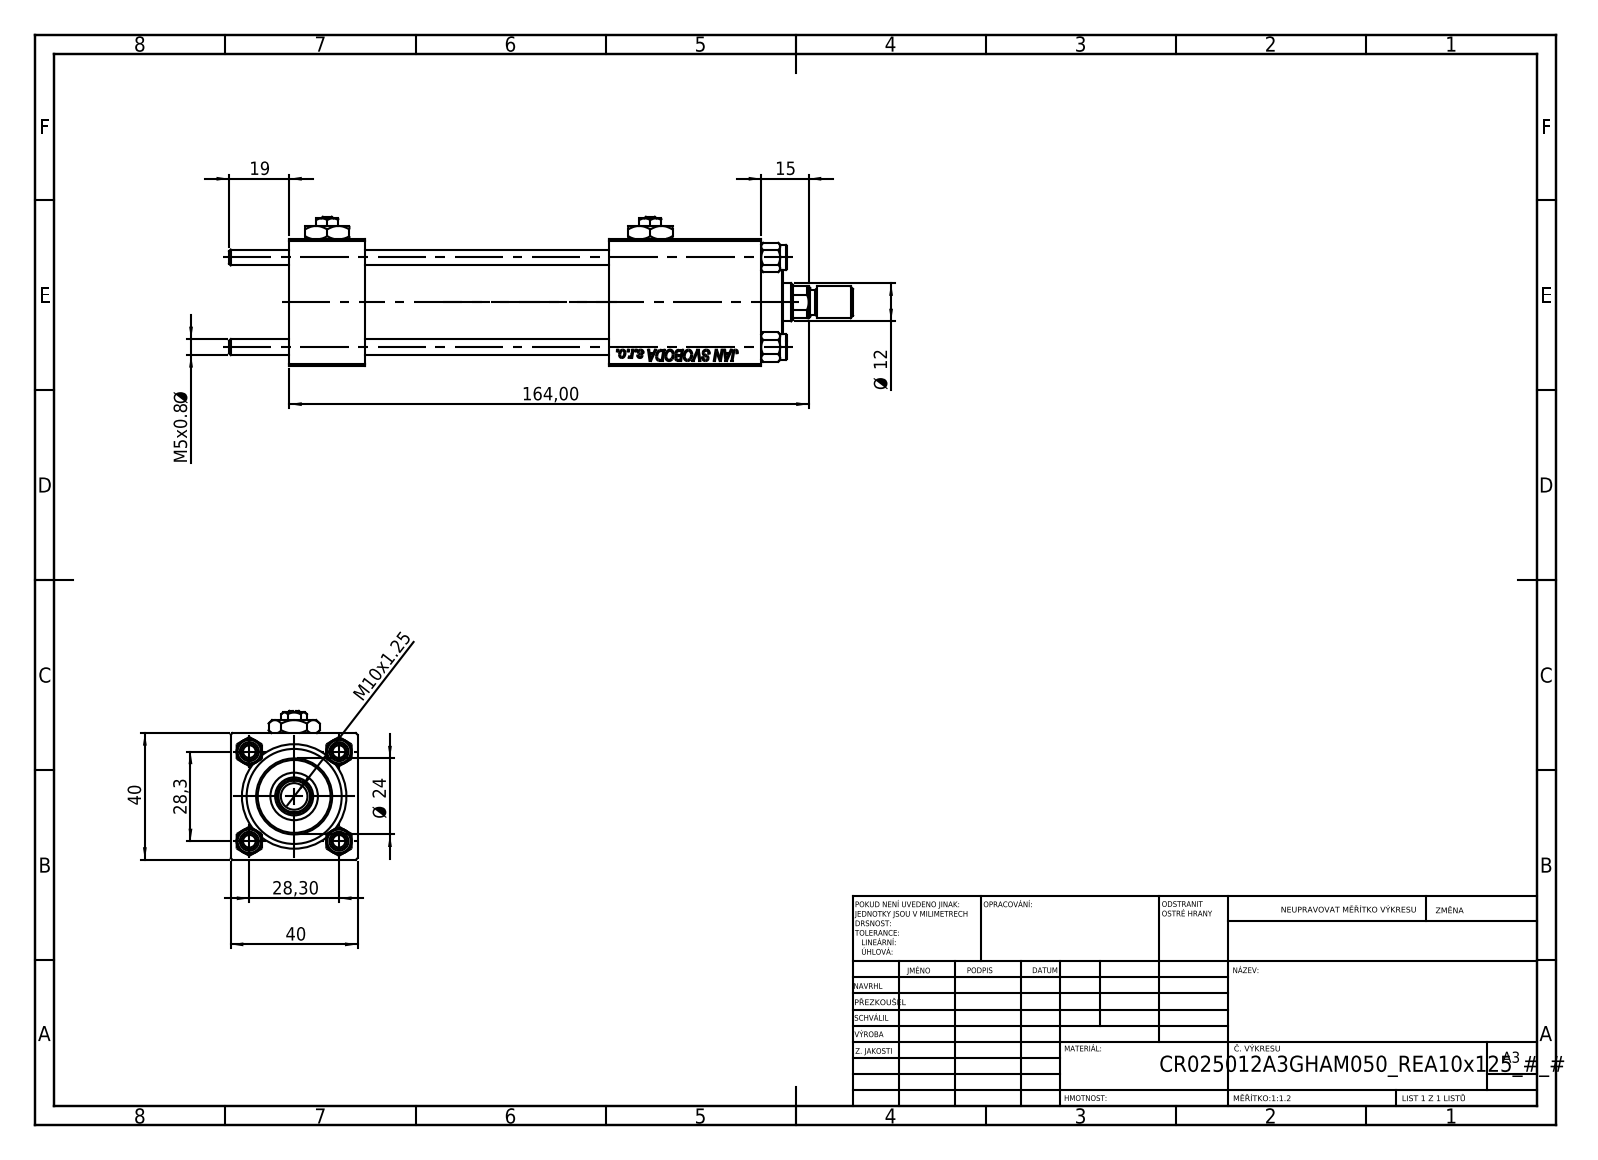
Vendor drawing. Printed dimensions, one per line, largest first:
164,00
40
40
28,3
28,30
Ø 24
19
15
Ø 12
M10x1.25
M5x0.8 Ø
